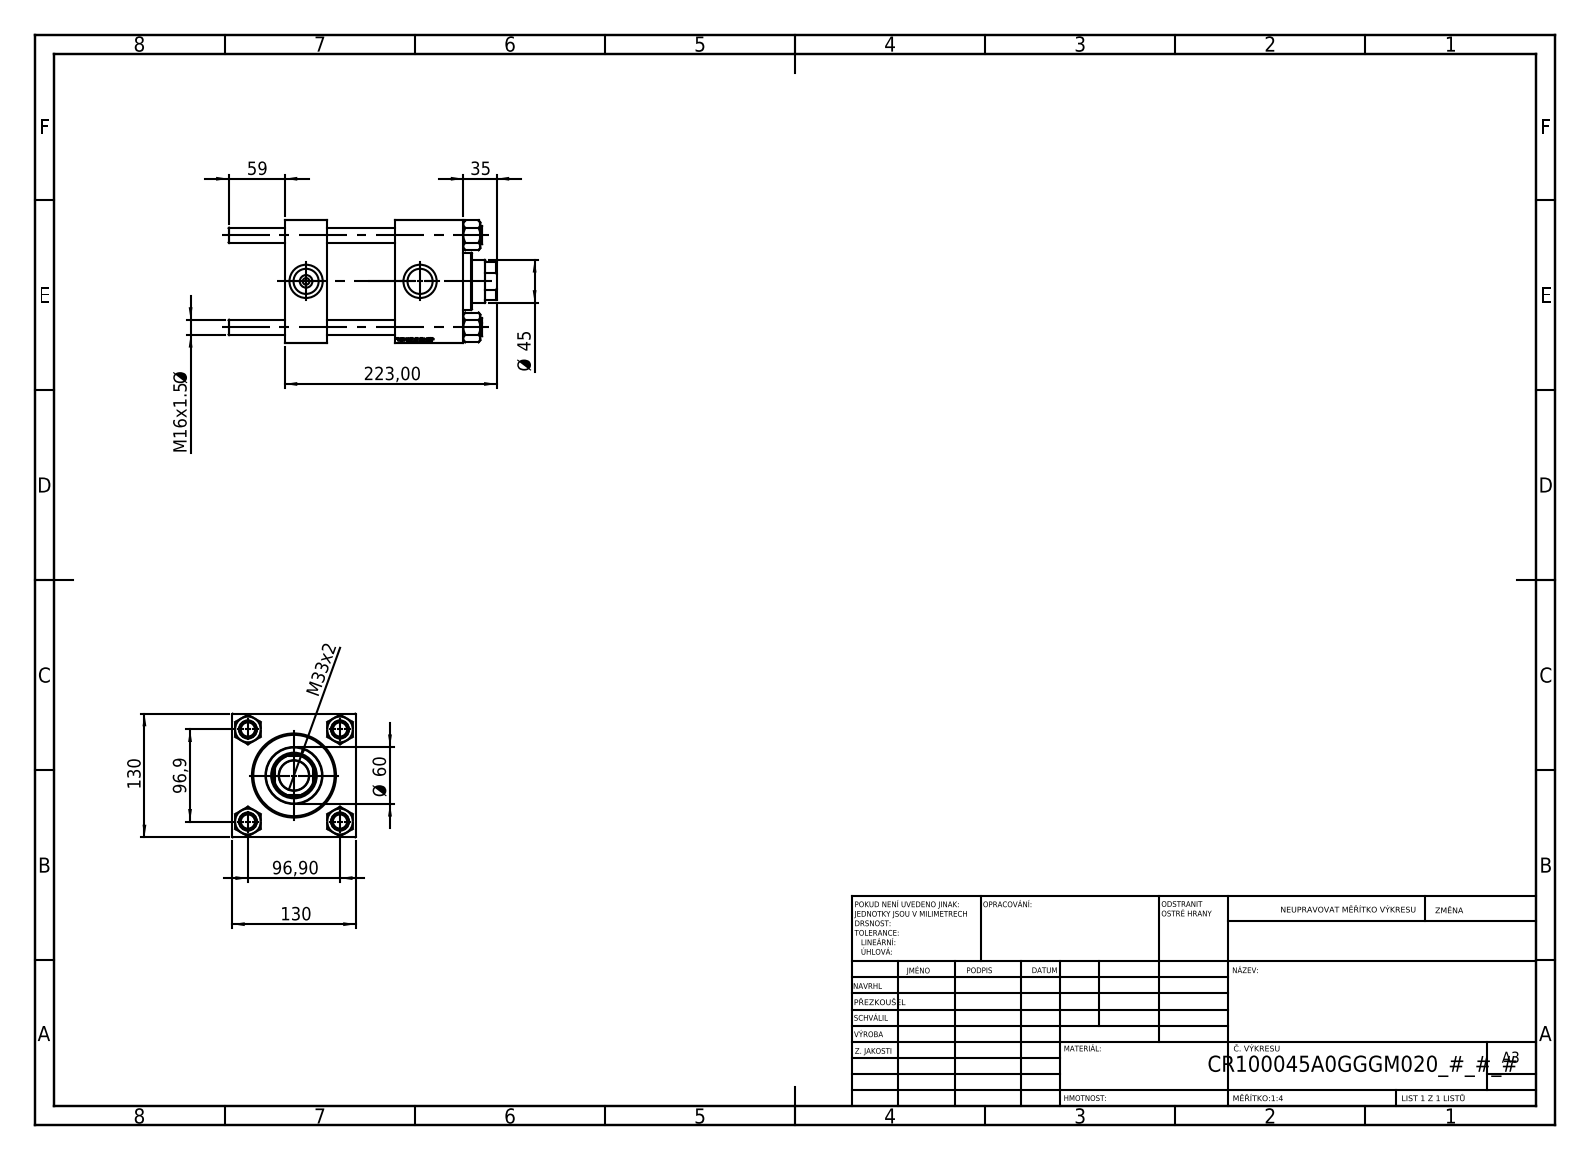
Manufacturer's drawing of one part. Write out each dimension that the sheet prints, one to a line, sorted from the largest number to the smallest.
223,00
130
130
96,9
96,90
Ø 60
59
Ø 45
35
M33x2
M16x1.5 Ø
